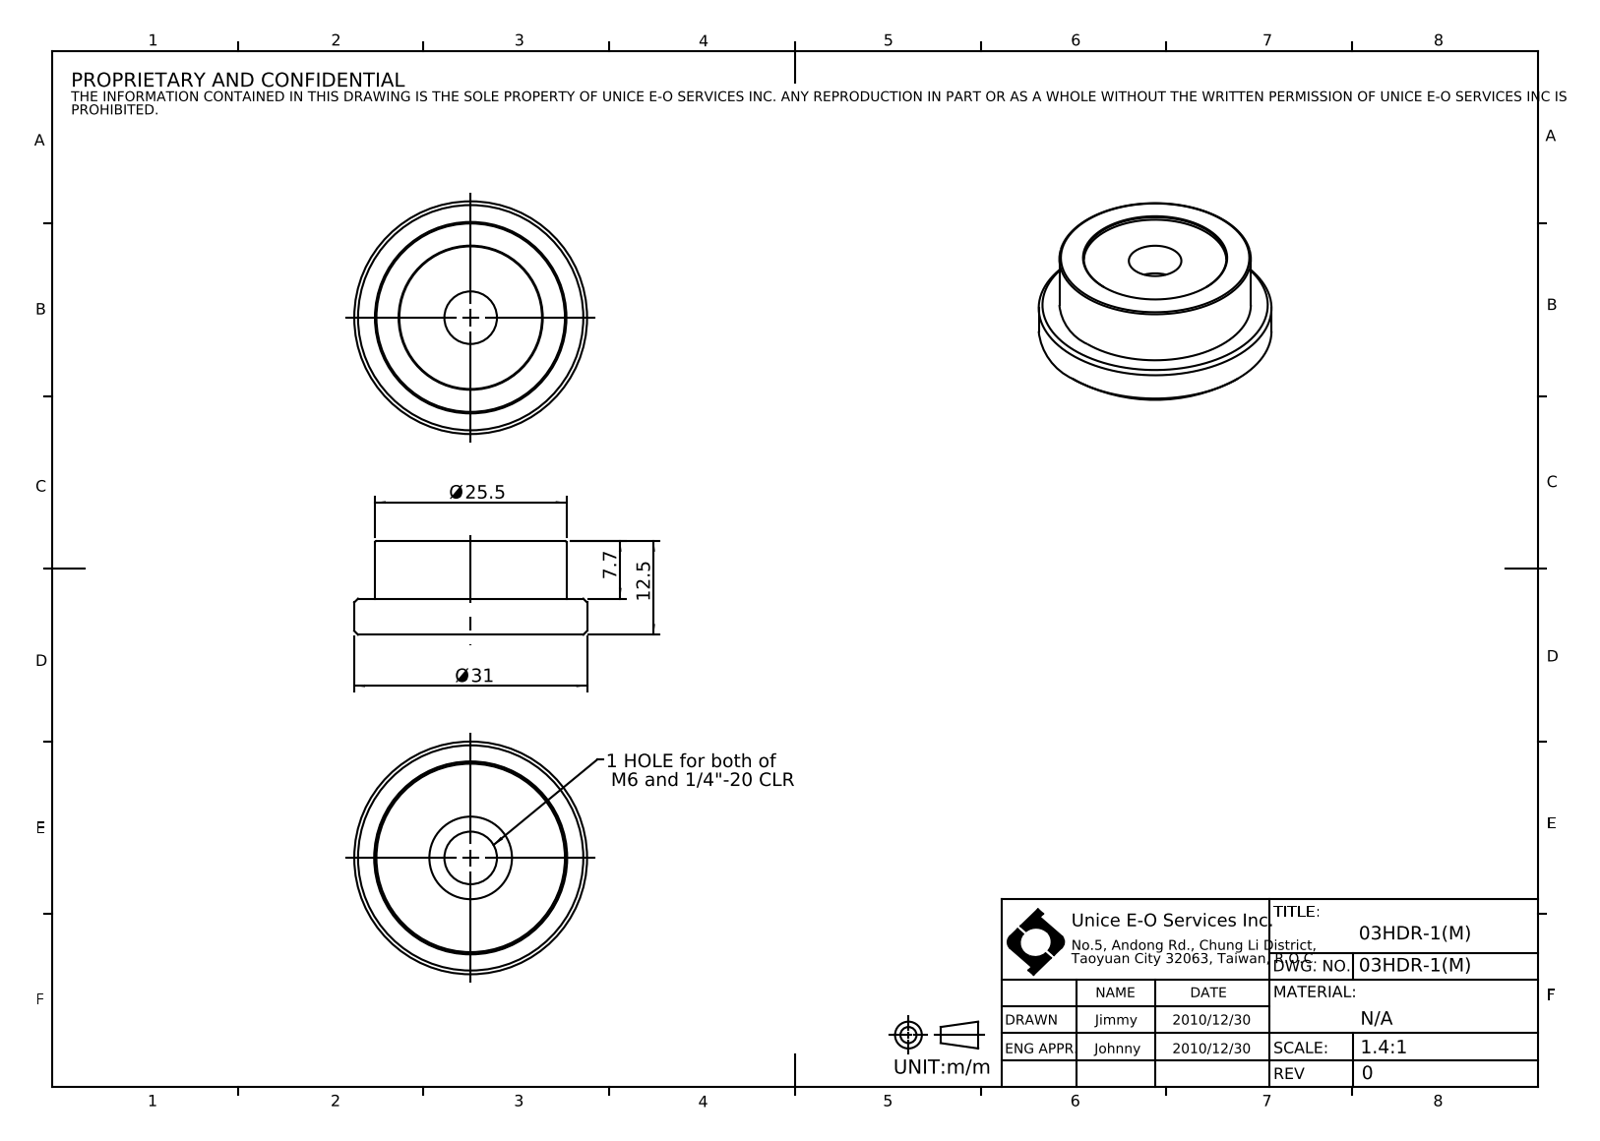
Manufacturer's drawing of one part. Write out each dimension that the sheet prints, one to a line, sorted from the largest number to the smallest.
Ø 31
Ø 25.5
12.5
7.7
